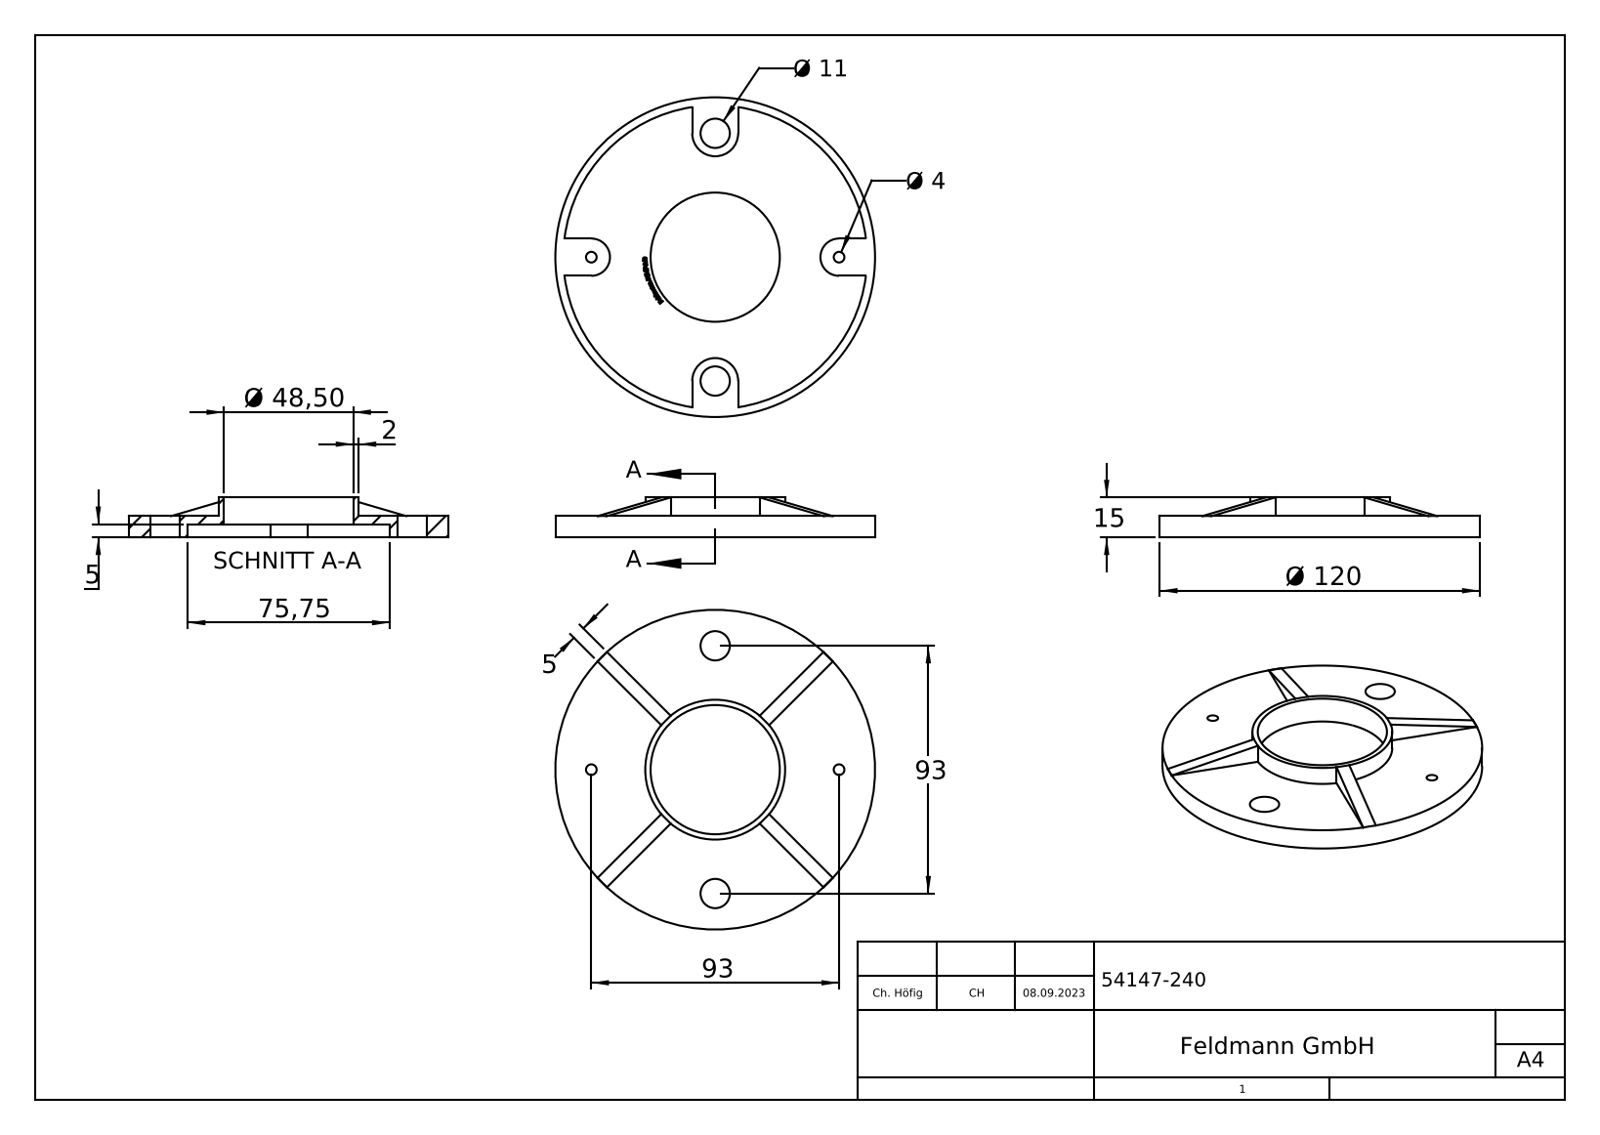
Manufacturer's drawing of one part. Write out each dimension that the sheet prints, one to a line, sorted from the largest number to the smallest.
Ø 120
93
93
75,75
Ø 48,50
15
Ø 11
5
5
Ø 4
2
